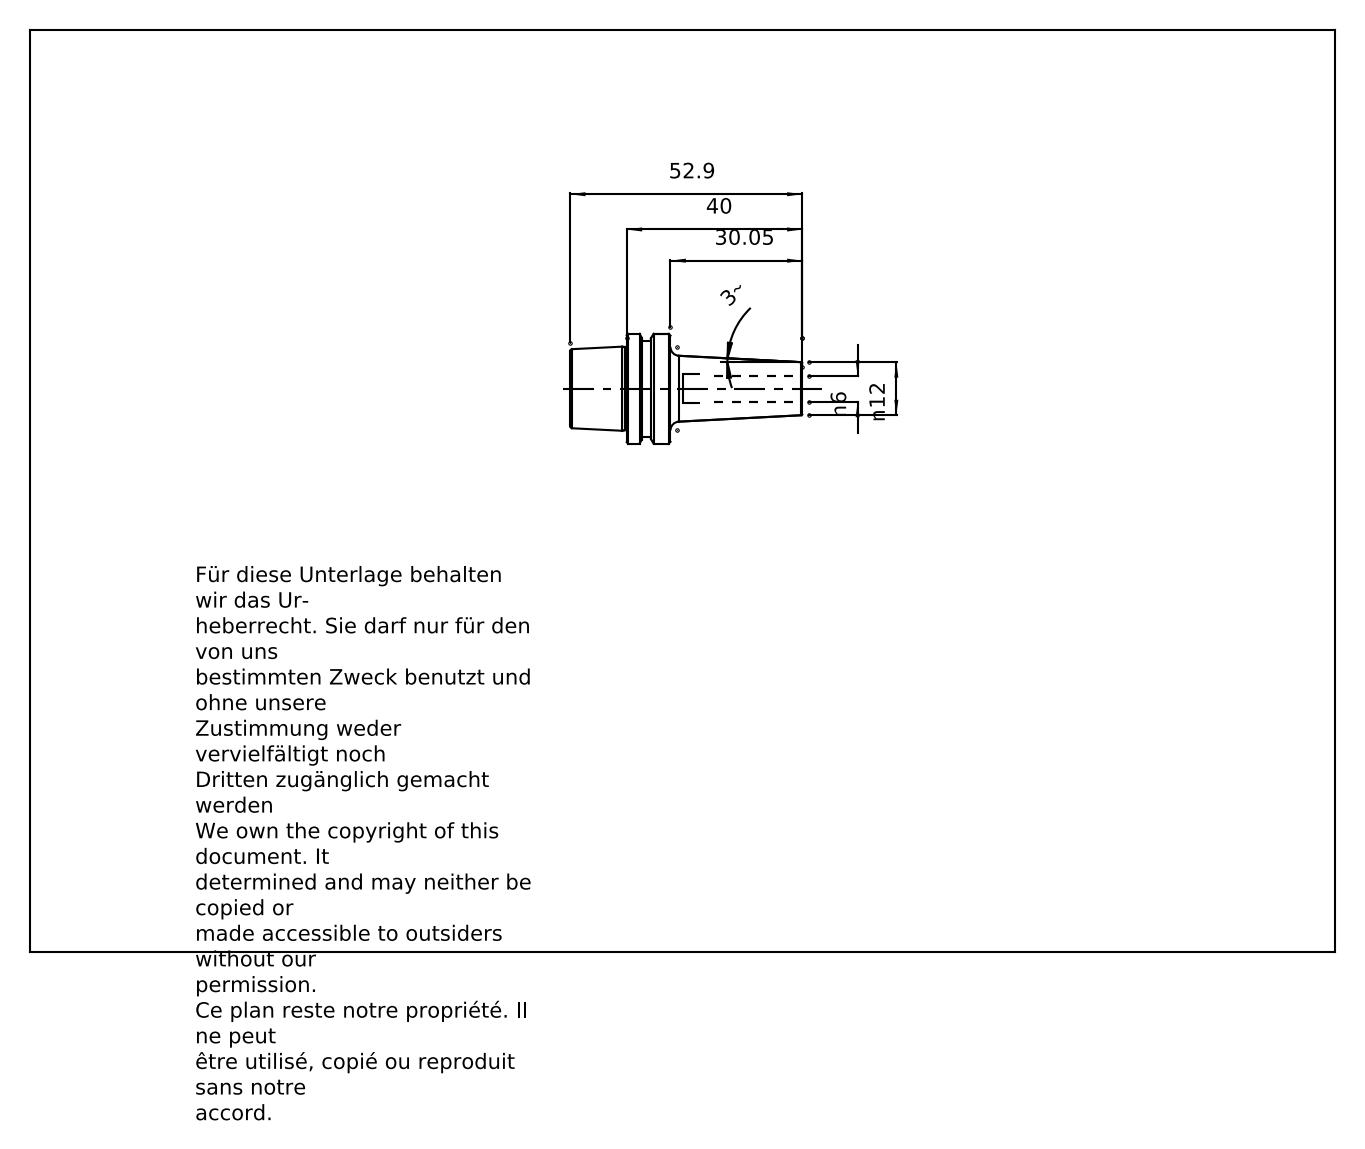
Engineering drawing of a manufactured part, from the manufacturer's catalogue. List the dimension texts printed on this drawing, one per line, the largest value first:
52.9
40
30.05
n12
n6
